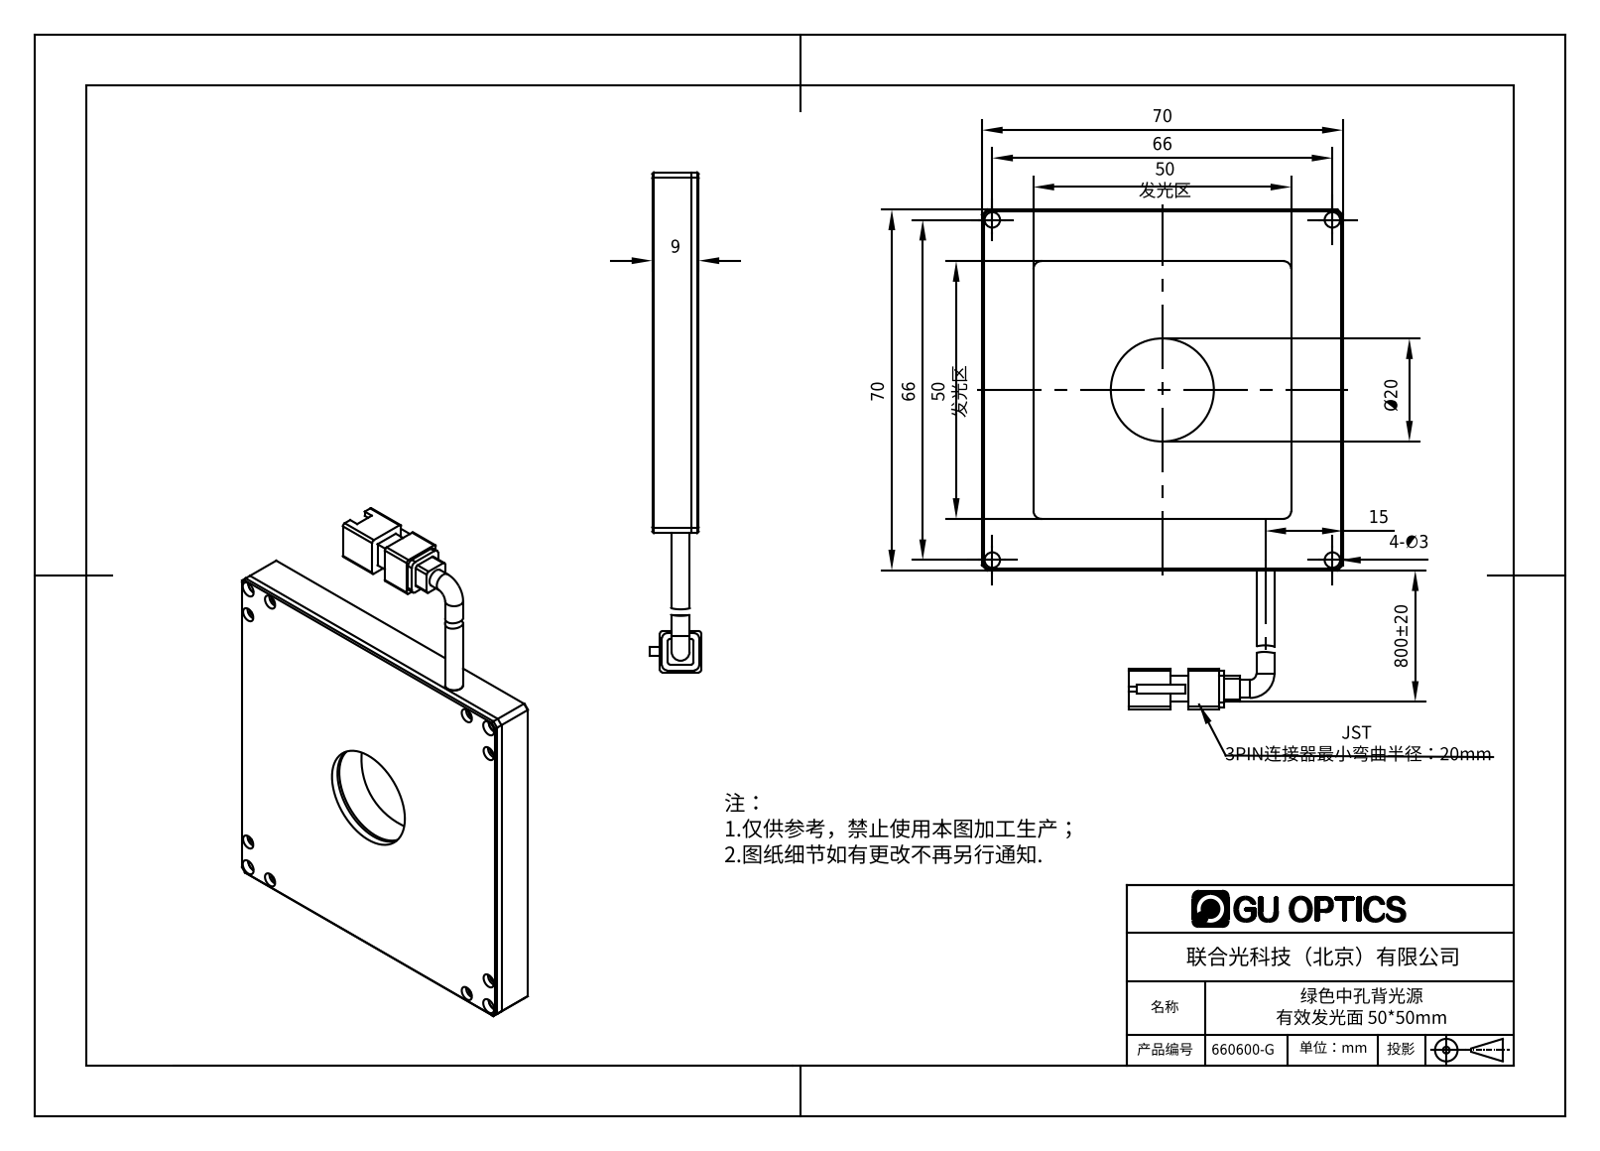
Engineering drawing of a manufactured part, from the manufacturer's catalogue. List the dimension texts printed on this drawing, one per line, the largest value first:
800±20
70
70
66
66
50 发光区
50 发光区
Ø20
15
9
4-∅3
